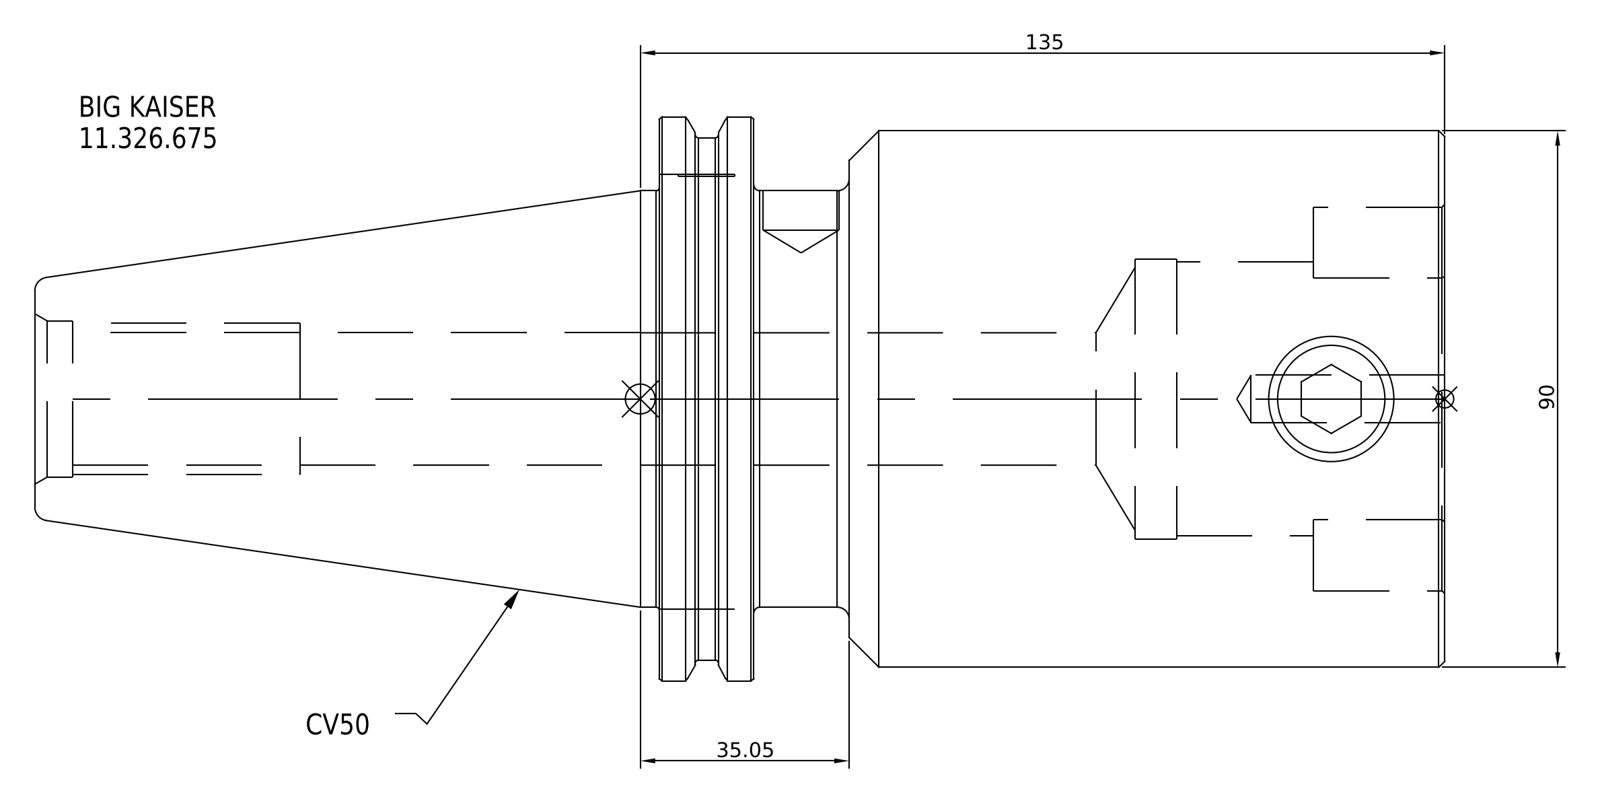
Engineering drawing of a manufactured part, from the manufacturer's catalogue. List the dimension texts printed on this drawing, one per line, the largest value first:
135
90
35.05
